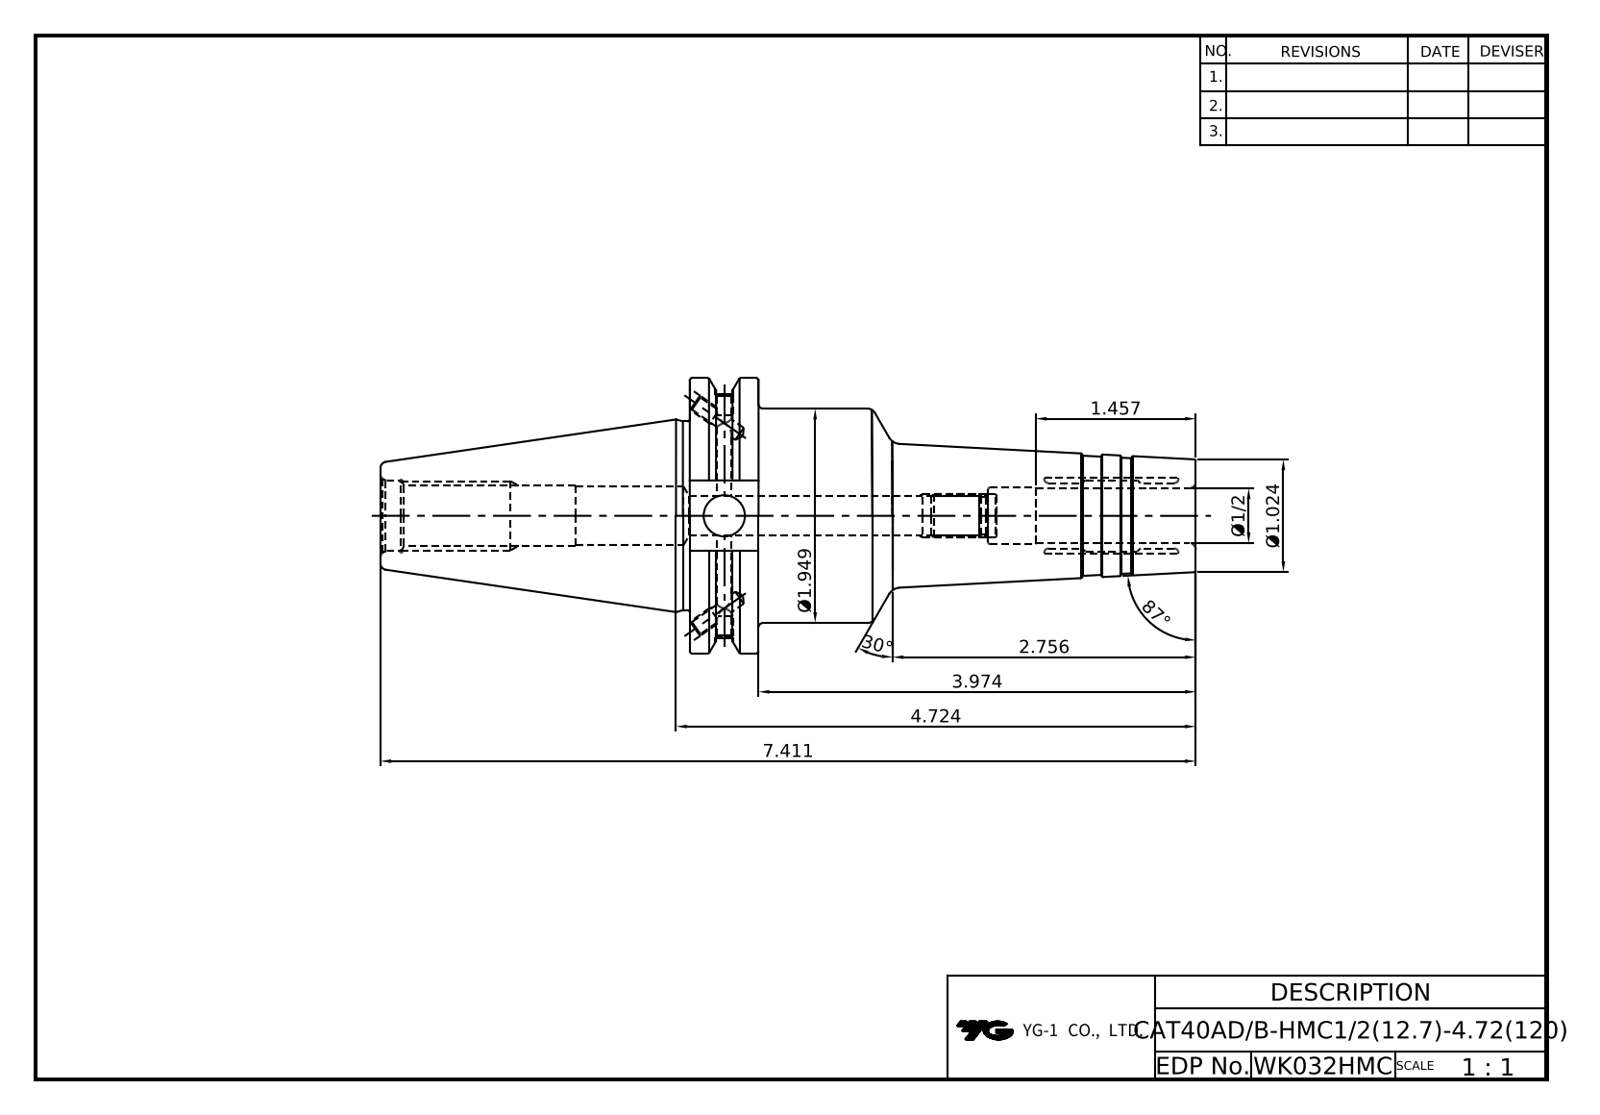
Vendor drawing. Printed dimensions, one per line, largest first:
87°
30°
7.411
4.724
3.974
2.756
Ø1.949
1.457
Ø1.024
Ø1/2
